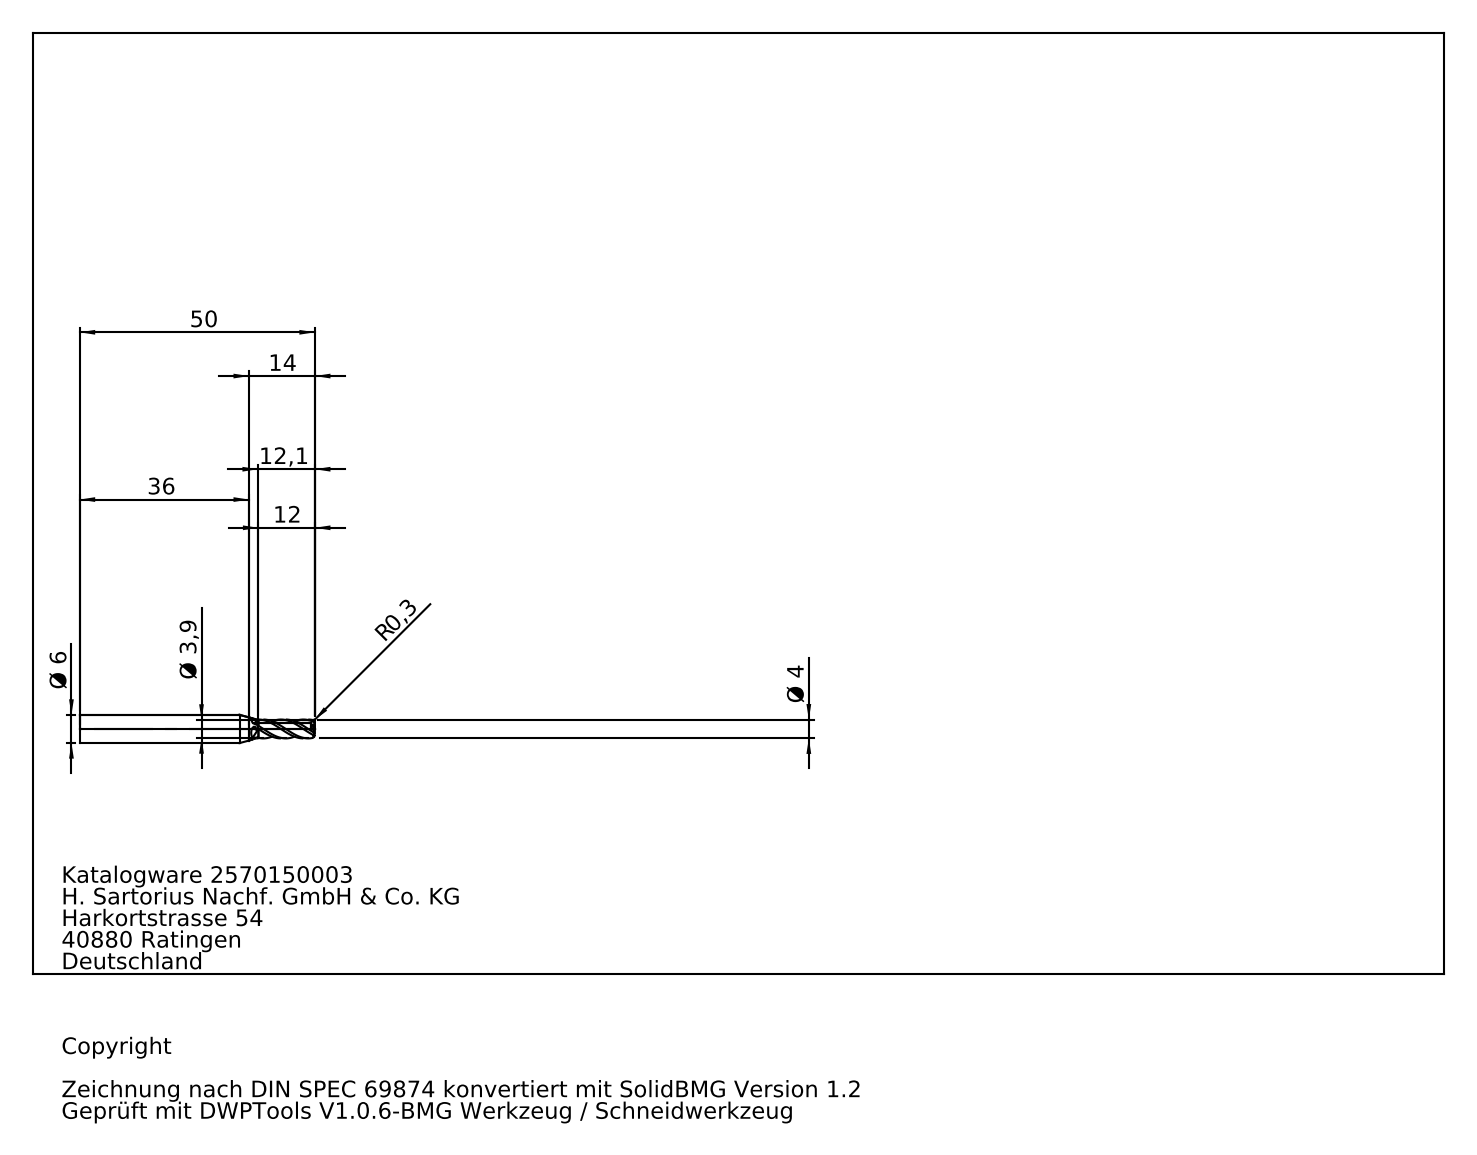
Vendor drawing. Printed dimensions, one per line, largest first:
50
36
14
12,1
12
Ø 6
Ø 4
Ø 3,9
R 0,3
